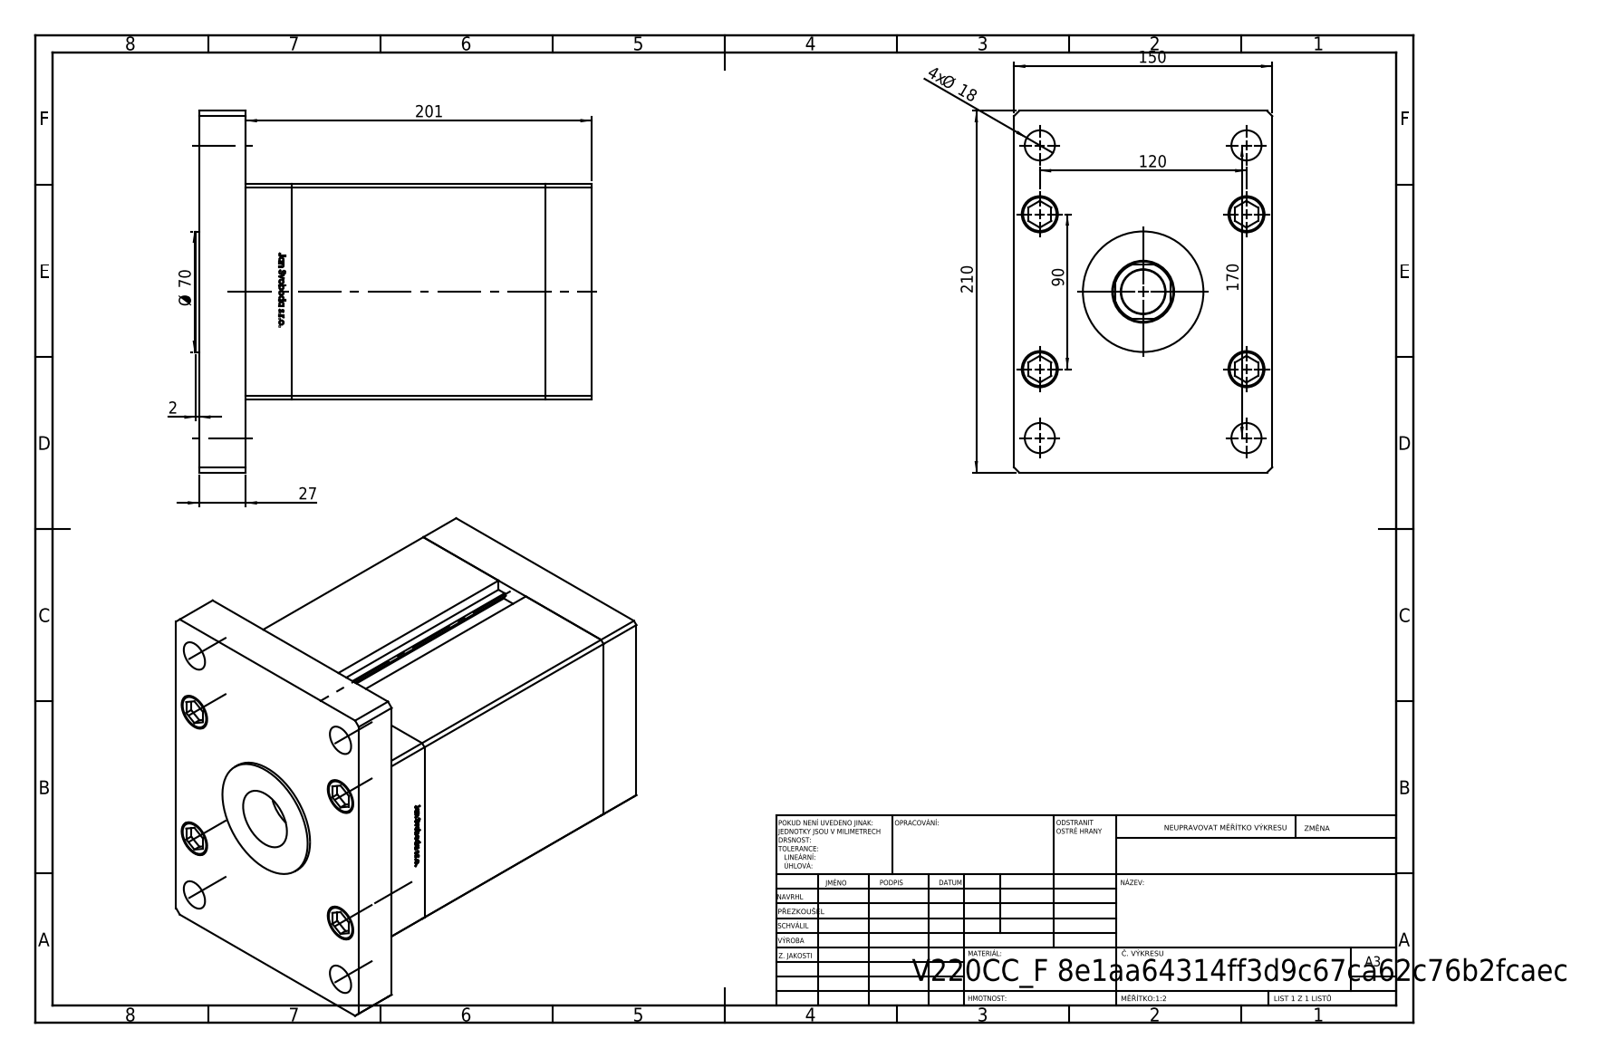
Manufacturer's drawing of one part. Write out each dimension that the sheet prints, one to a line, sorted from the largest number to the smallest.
210
201
170
150
120
90
Ø 70
27
4x Ø 18
2
